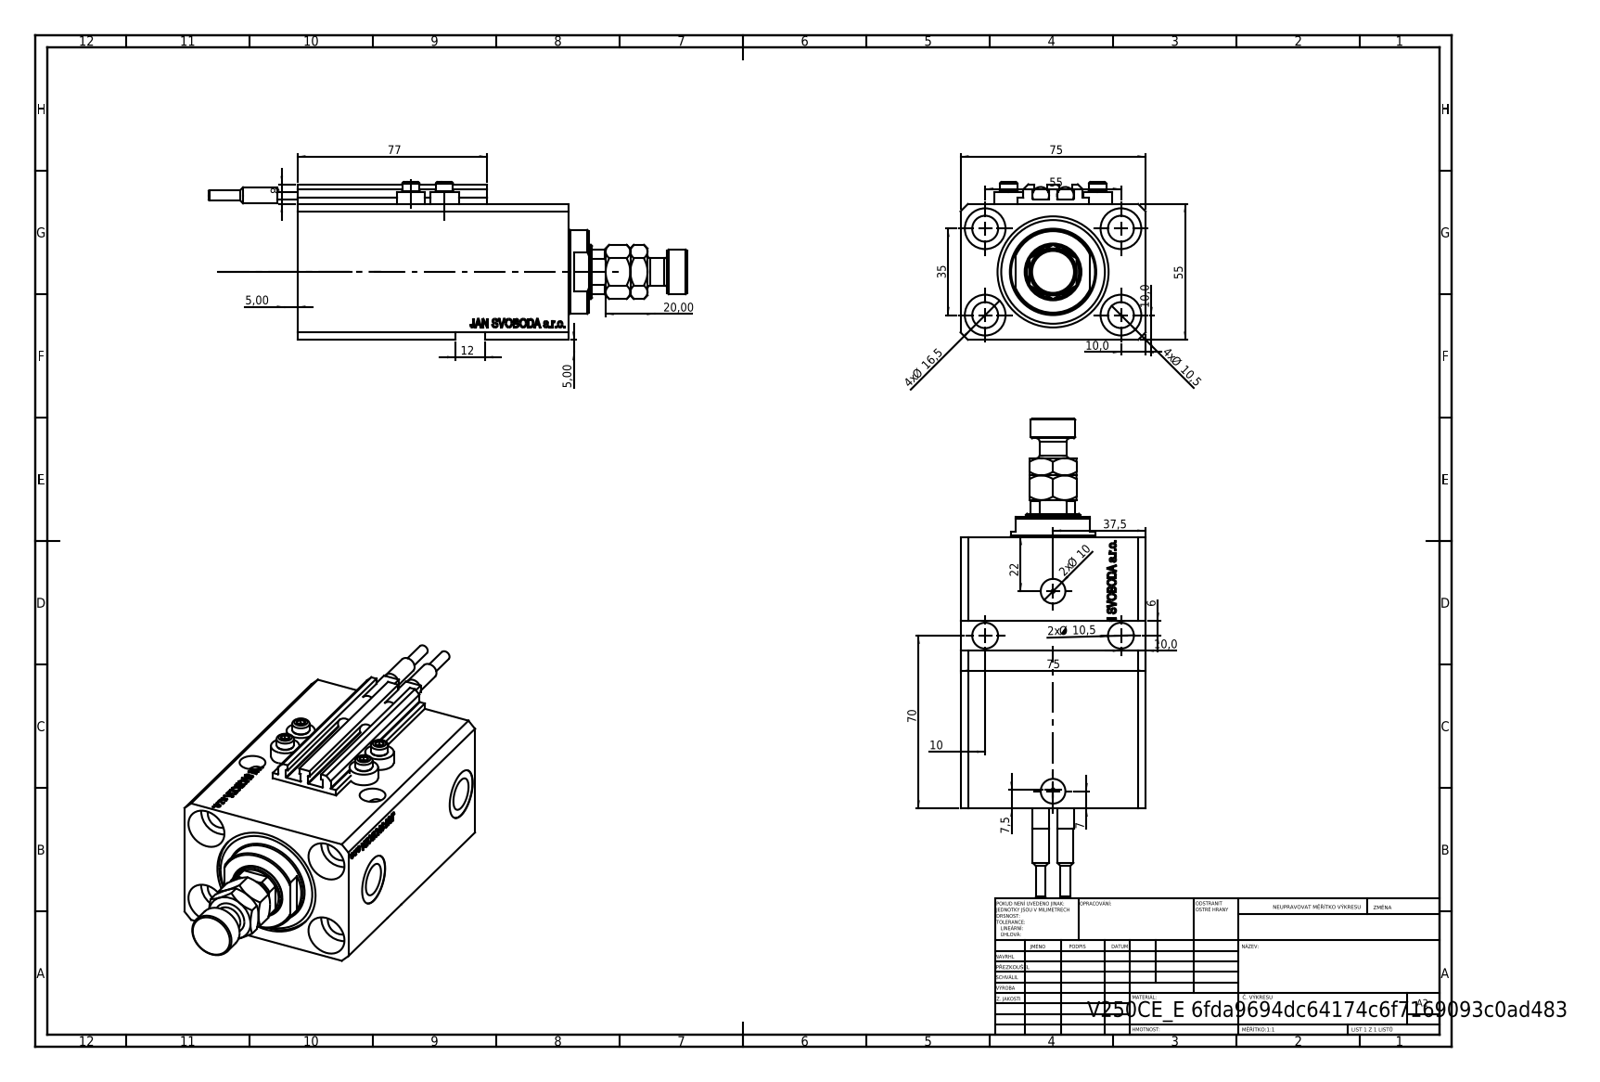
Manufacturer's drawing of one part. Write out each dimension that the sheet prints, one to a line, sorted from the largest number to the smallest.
77
75
75
70
55
55
37,5
35
22
20,00
4x Ø 16,5
12
4x Ø 10,5
2x Ø 10,5
10,0
10,0
2x Ø 10
10,0
10
8
7,5
7
6
5,00
5,00
